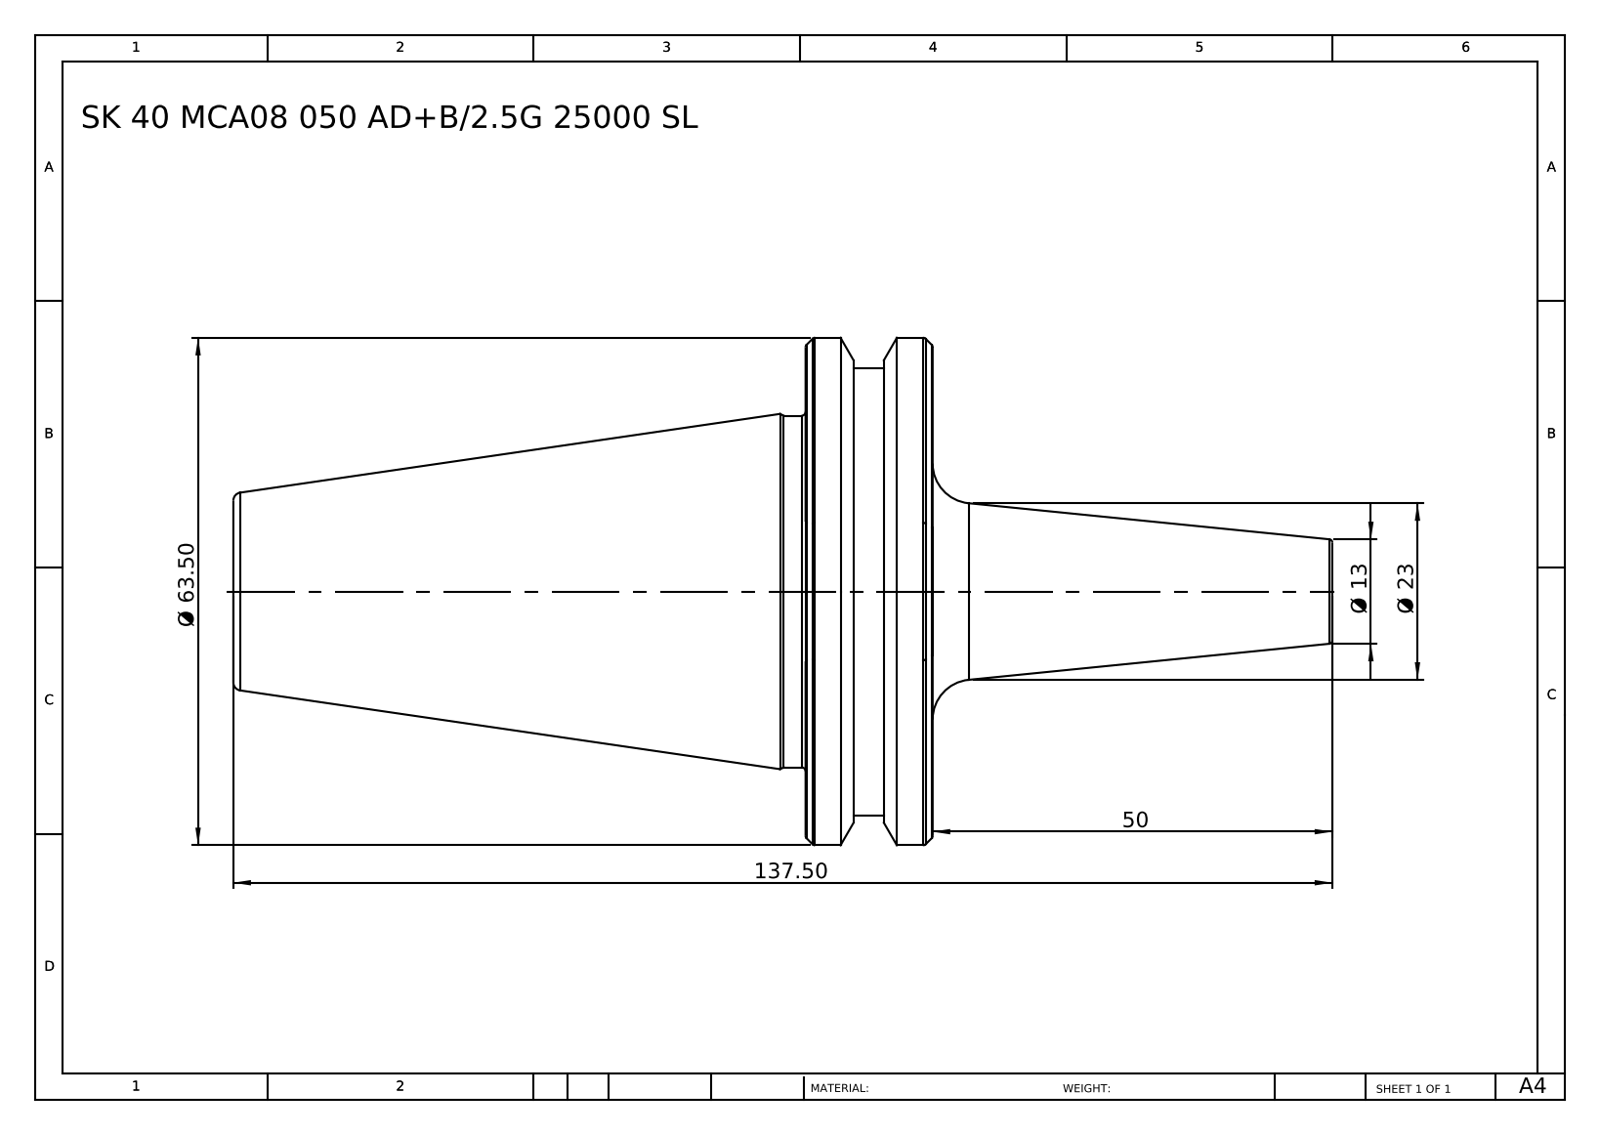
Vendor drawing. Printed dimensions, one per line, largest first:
137.50
Ø 63.50
50
Ø 23
Ø 13
